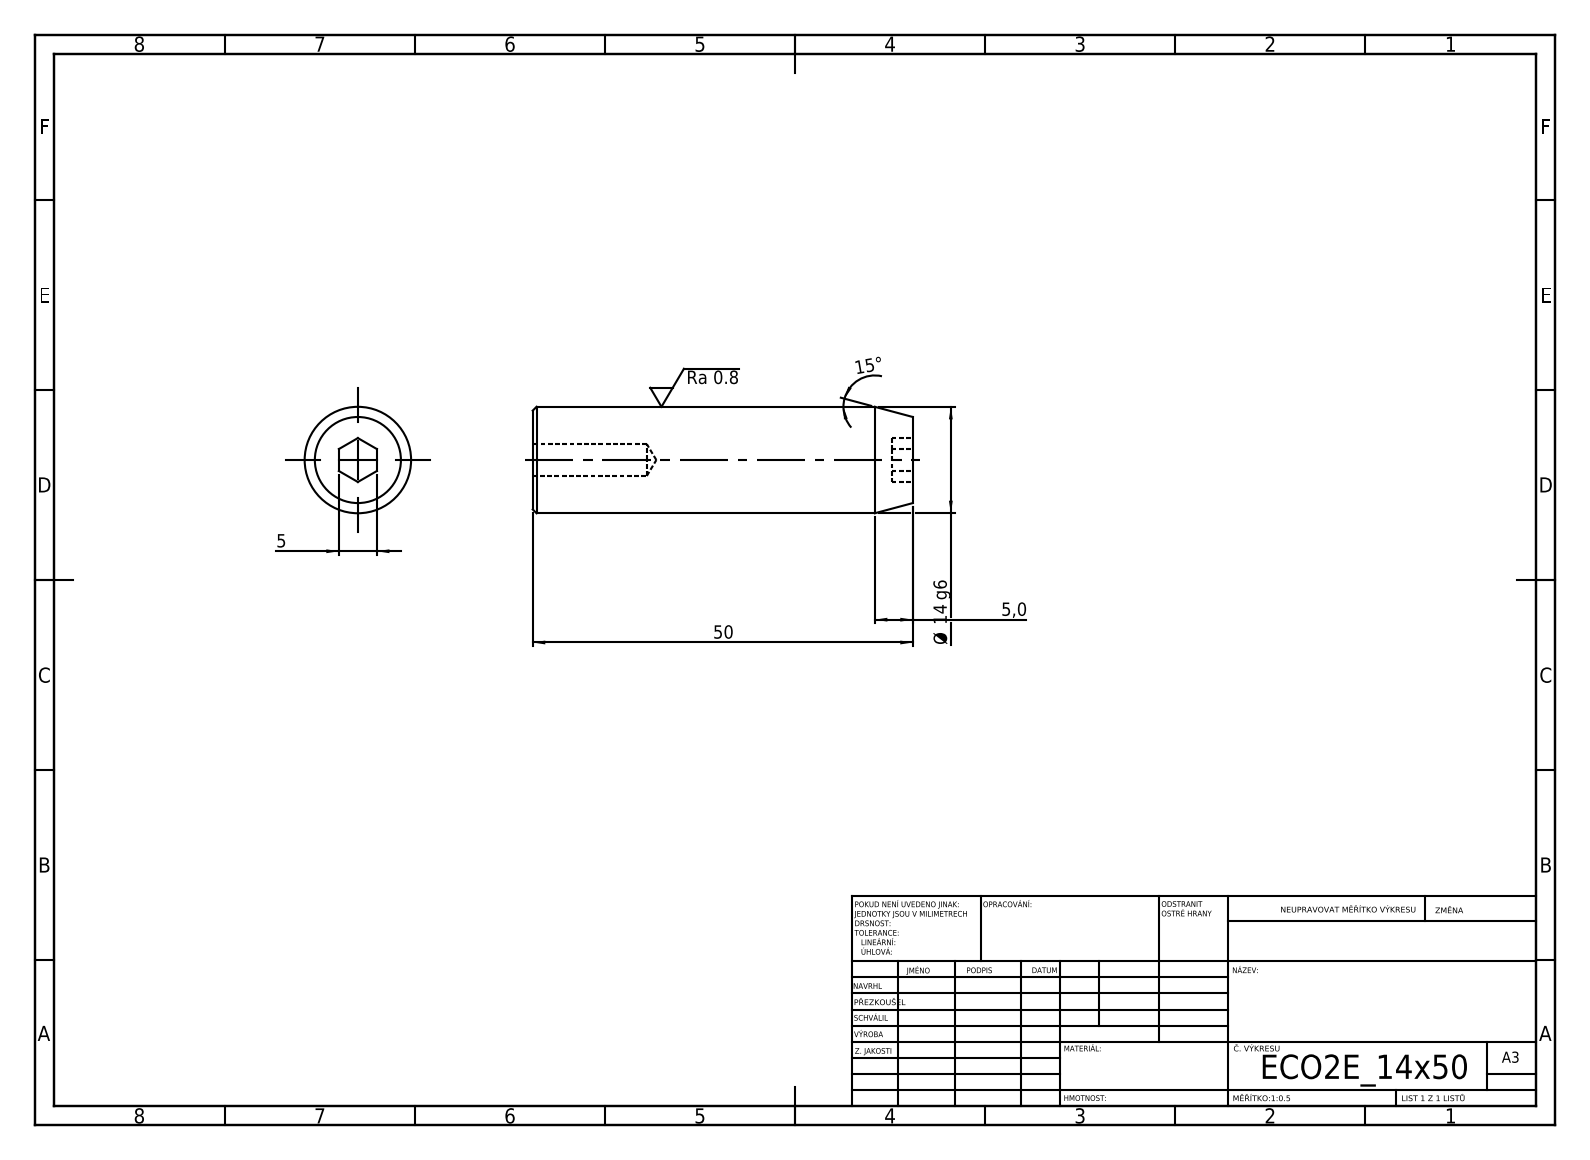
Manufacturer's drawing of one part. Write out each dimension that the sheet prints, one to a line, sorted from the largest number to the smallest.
50
15°
Ø 14 g6
5,0
5
